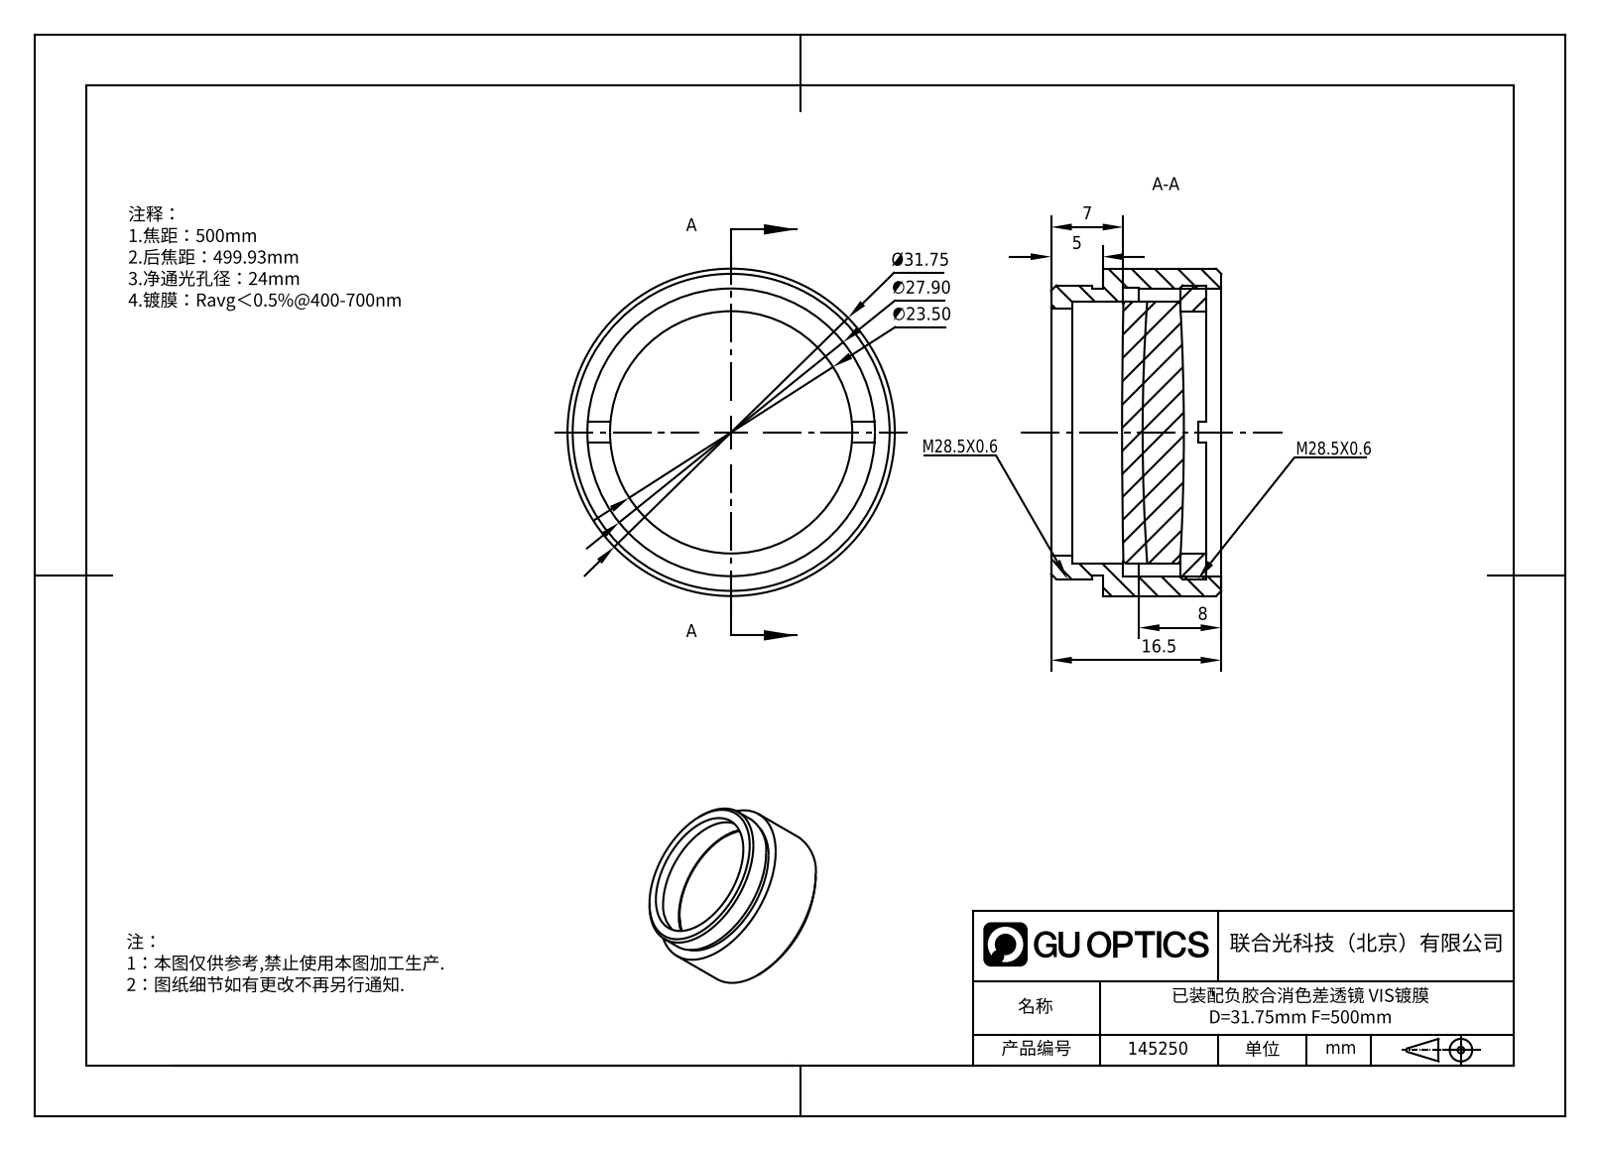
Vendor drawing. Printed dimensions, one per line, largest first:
Ø31.75
∅27.90
∅23.50
16.5
8
7
5
